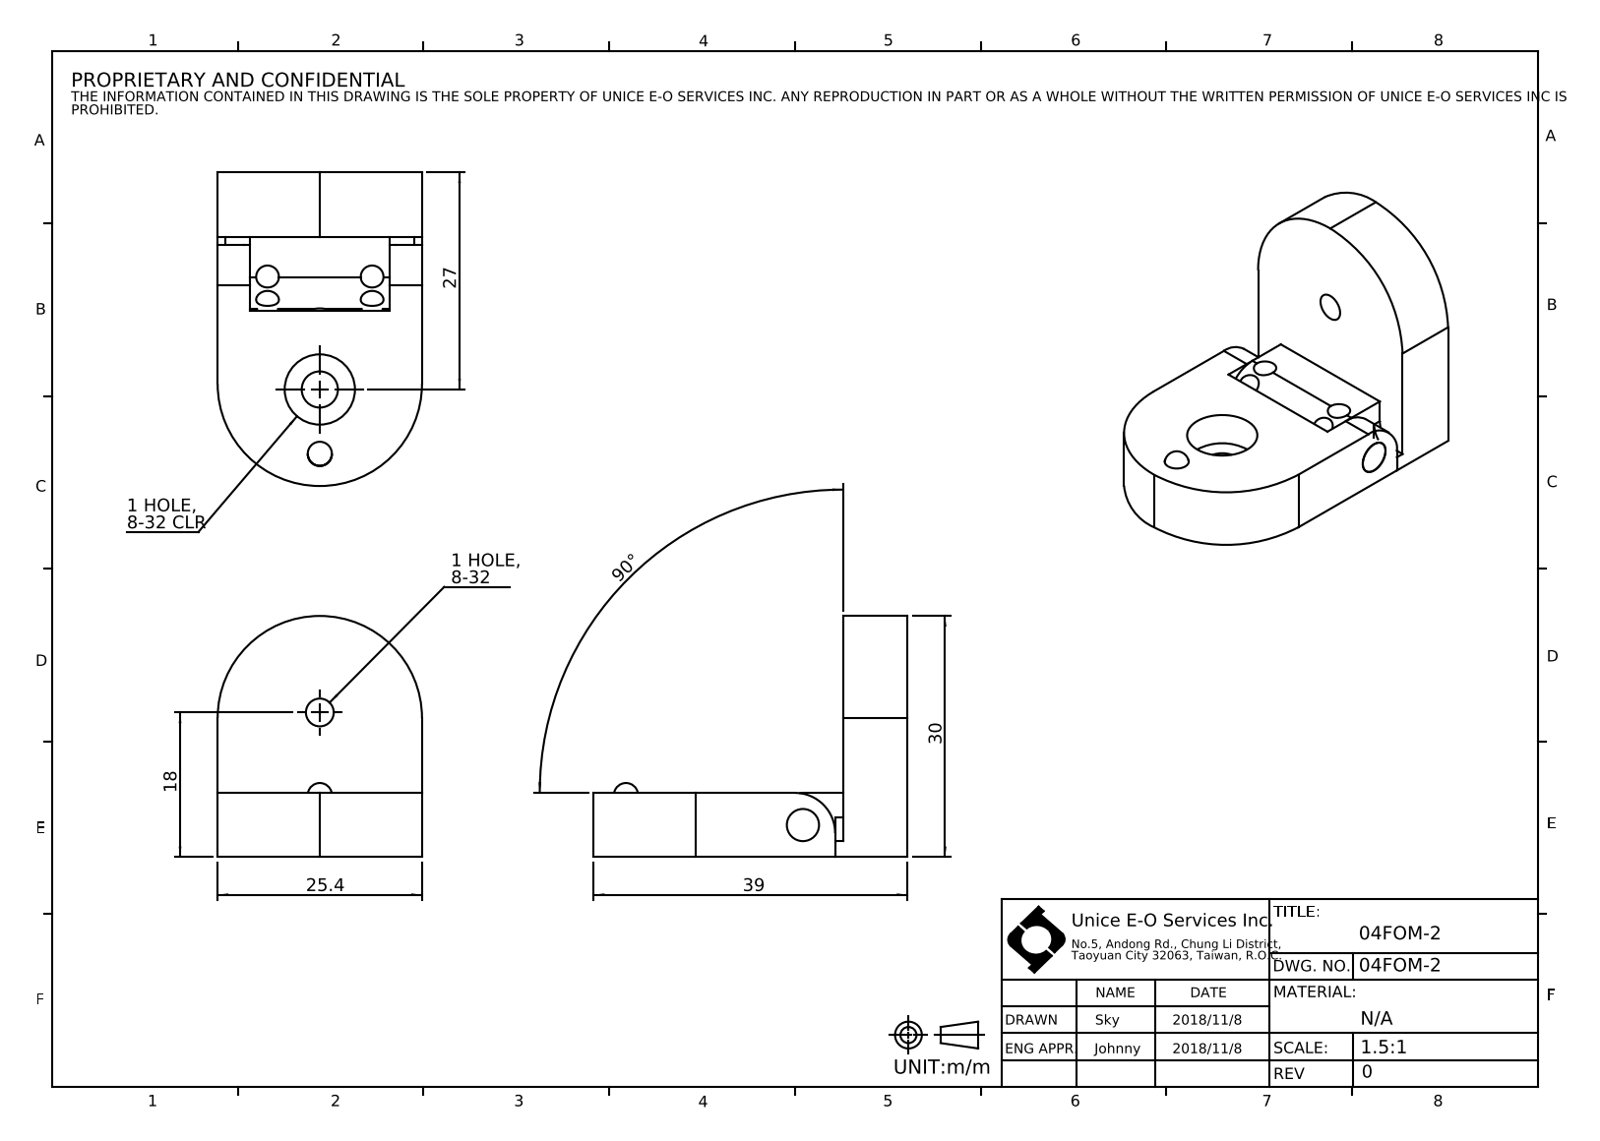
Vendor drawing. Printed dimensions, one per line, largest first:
90°
39
30
27
25.4
18
1 HOLE, 8-32
1 HOLE, 8-32 CLR
